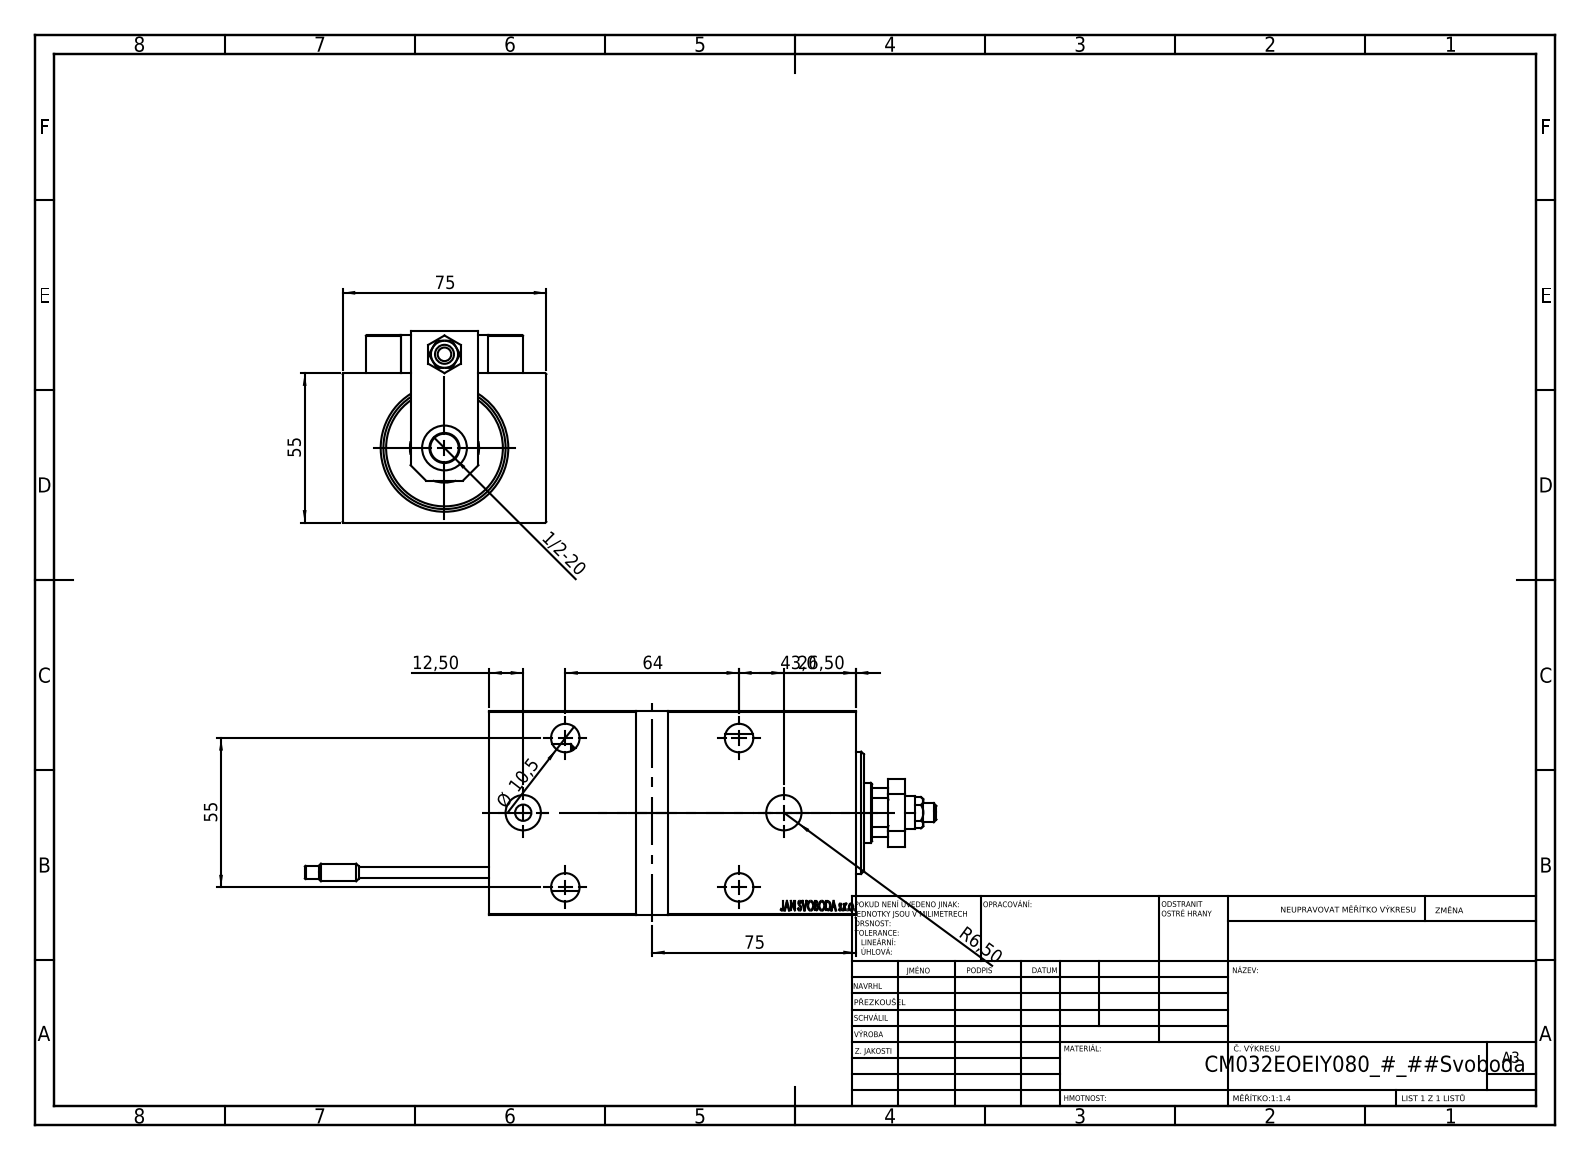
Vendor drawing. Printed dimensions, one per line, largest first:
75
75
64
55
55
43,0
26,50
12,50
Ø 10,5
R6,50
1/2-20
